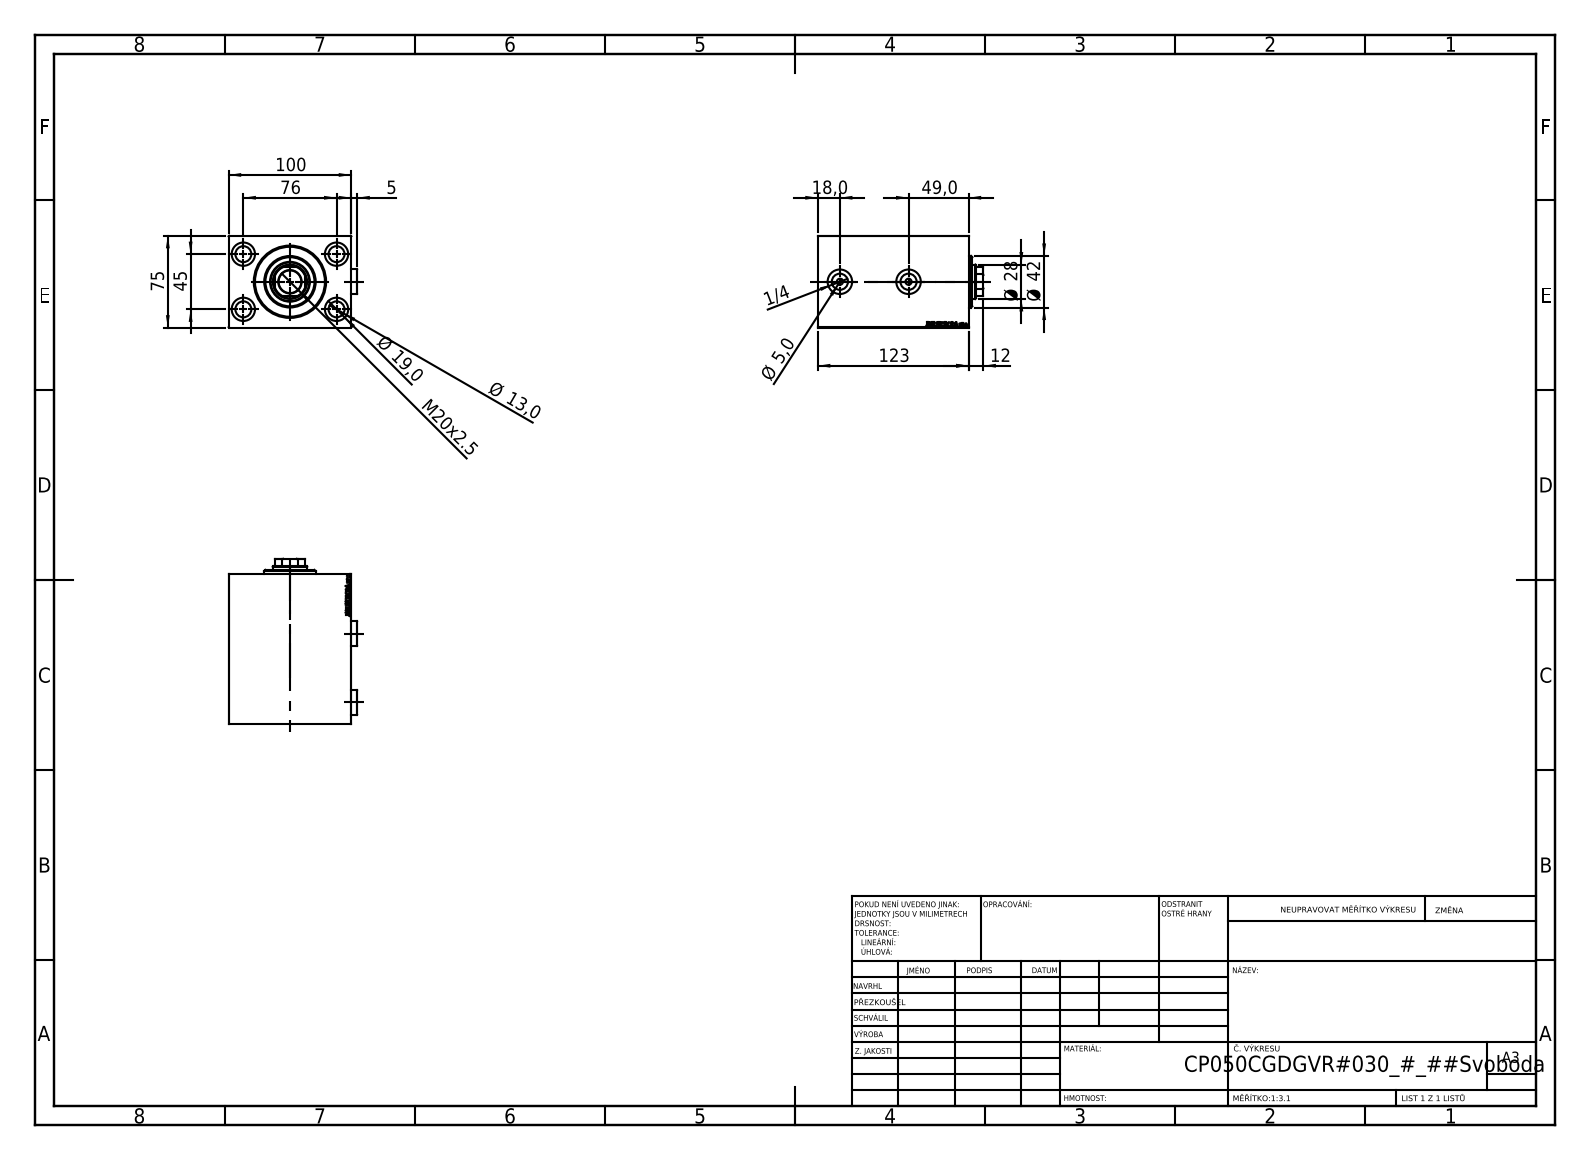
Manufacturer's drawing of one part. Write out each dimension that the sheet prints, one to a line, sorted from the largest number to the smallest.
123
100
76
75
49,0
45
Ø 42
Ø 28
M20x2.5
Ø 19,0
18,0
Ø 13,0
12
5
Ø 5,0
1/4
